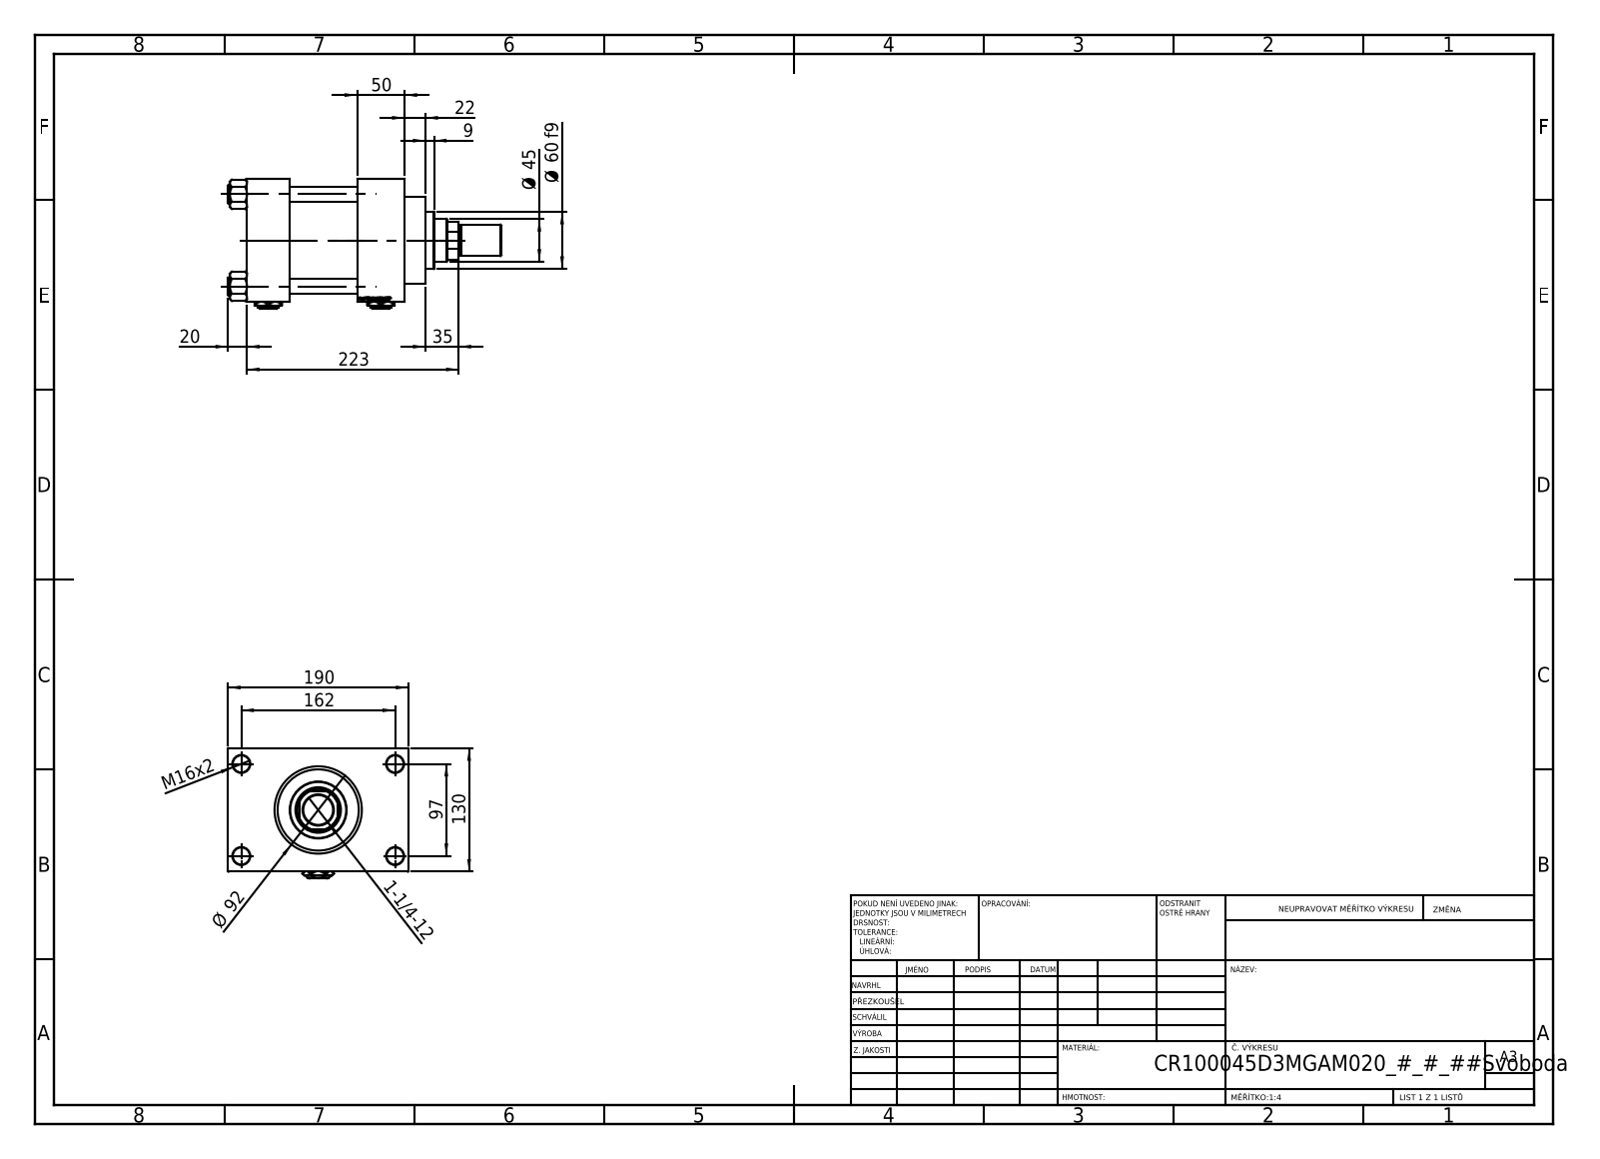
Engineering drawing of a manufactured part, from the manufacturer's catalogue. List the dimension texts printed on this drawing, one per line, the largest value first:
223
190
162
130
97
Ø 92
Ø 60 f9
50
Ø 45
35
22
20
M16x2
9
1-1/4-12
